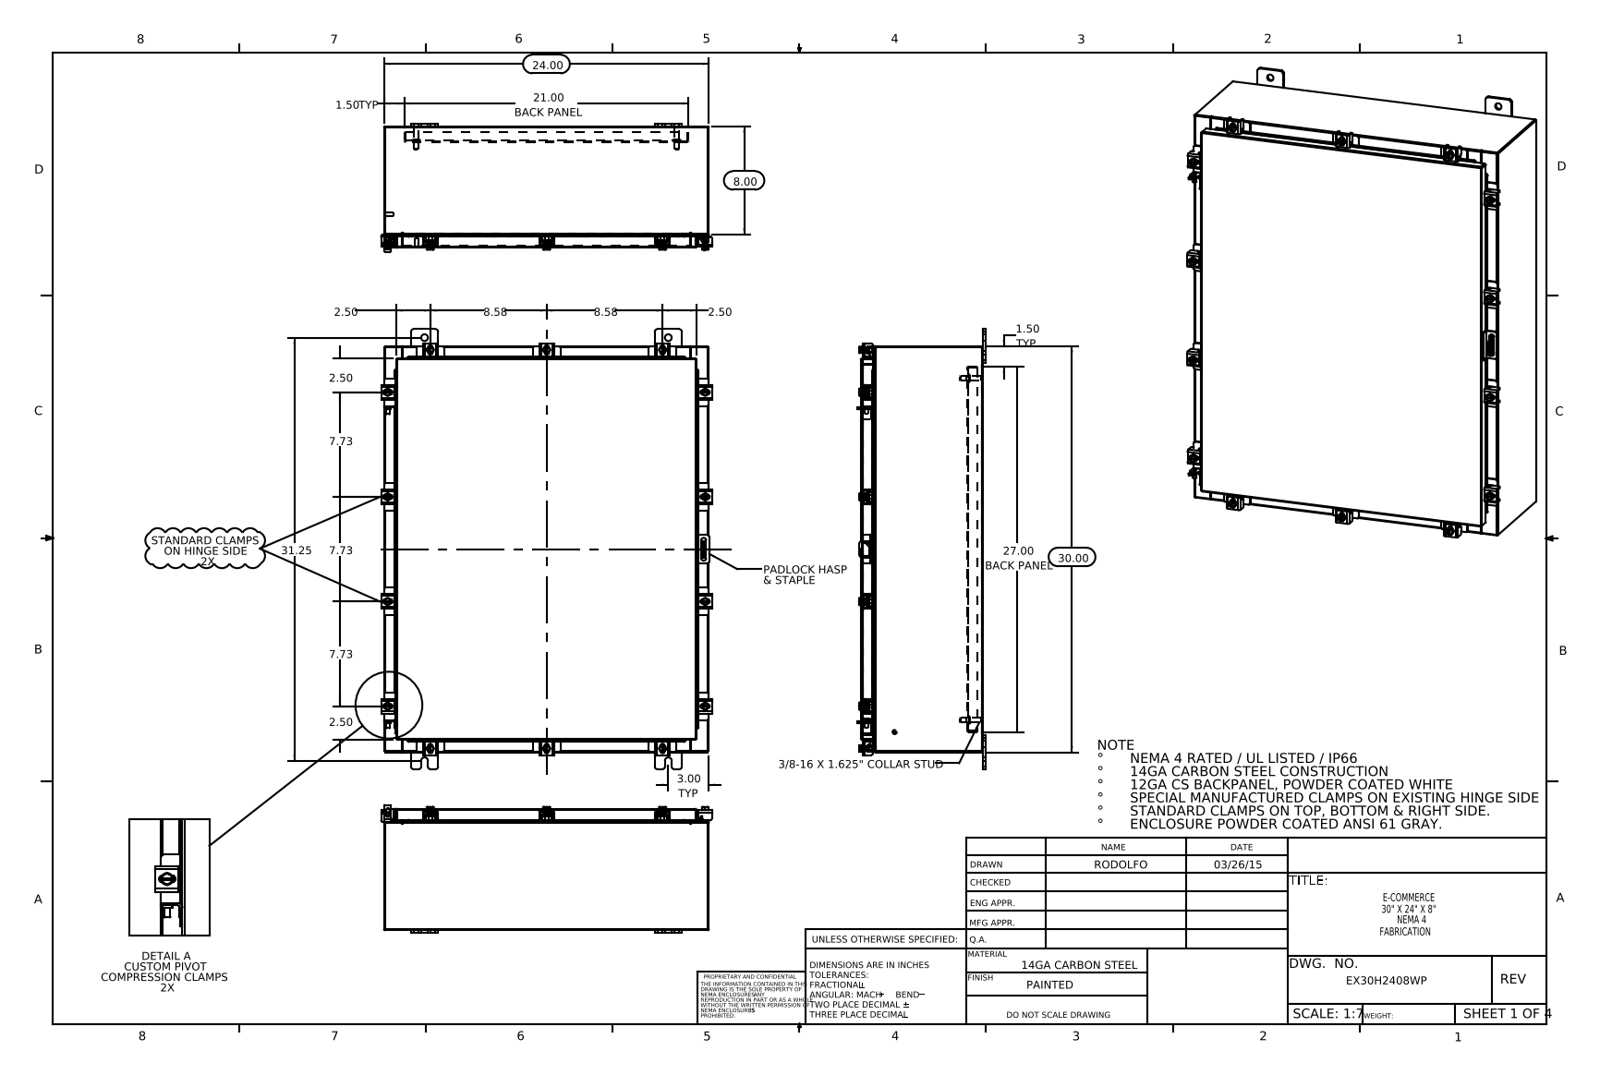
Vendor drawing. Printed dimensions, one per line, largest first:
31.25
30.00
27.00 BACK PANEL
24.00
21.00 BACK PANEL
8.58
8.58
8.00
7.73
7.73
7.73
3.00 TYP
2.50
2.50
2.50
2.50
1.50 TYP
1.50 TYP
